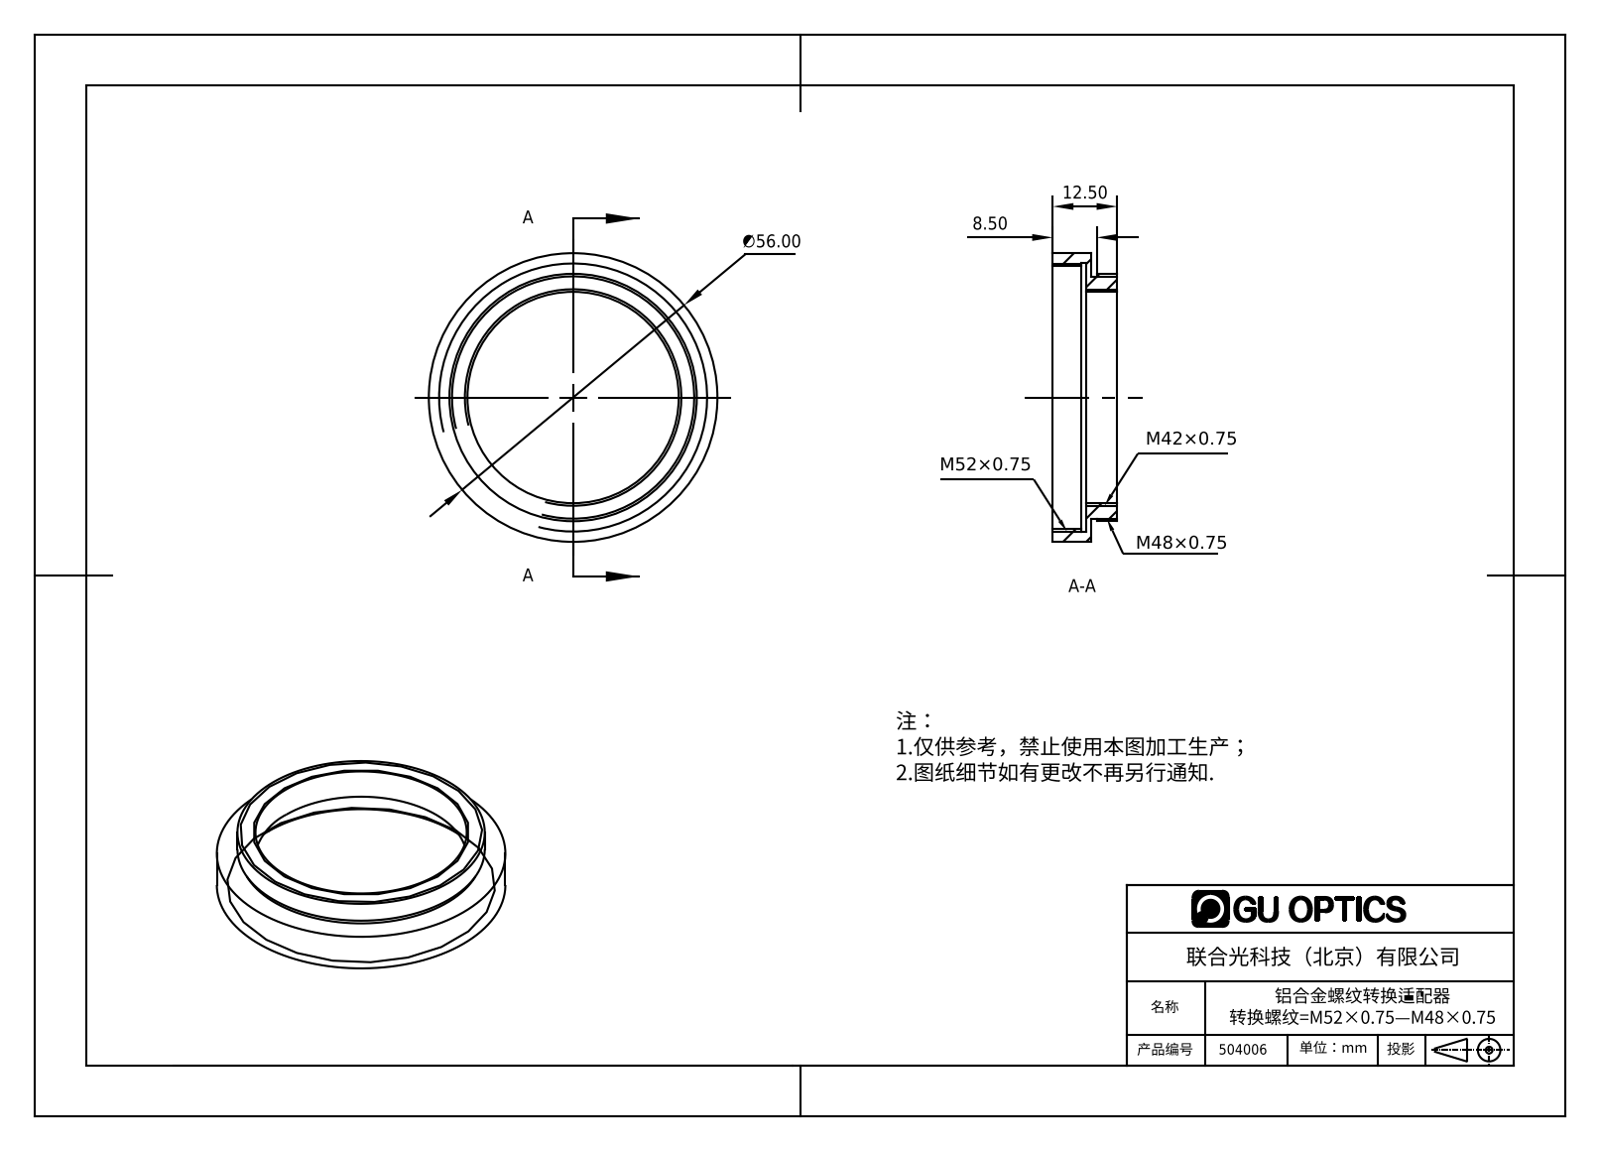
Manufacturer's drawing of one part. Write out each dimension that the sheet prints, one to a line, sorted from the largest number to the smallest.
∅56.00
12.50
8.50
